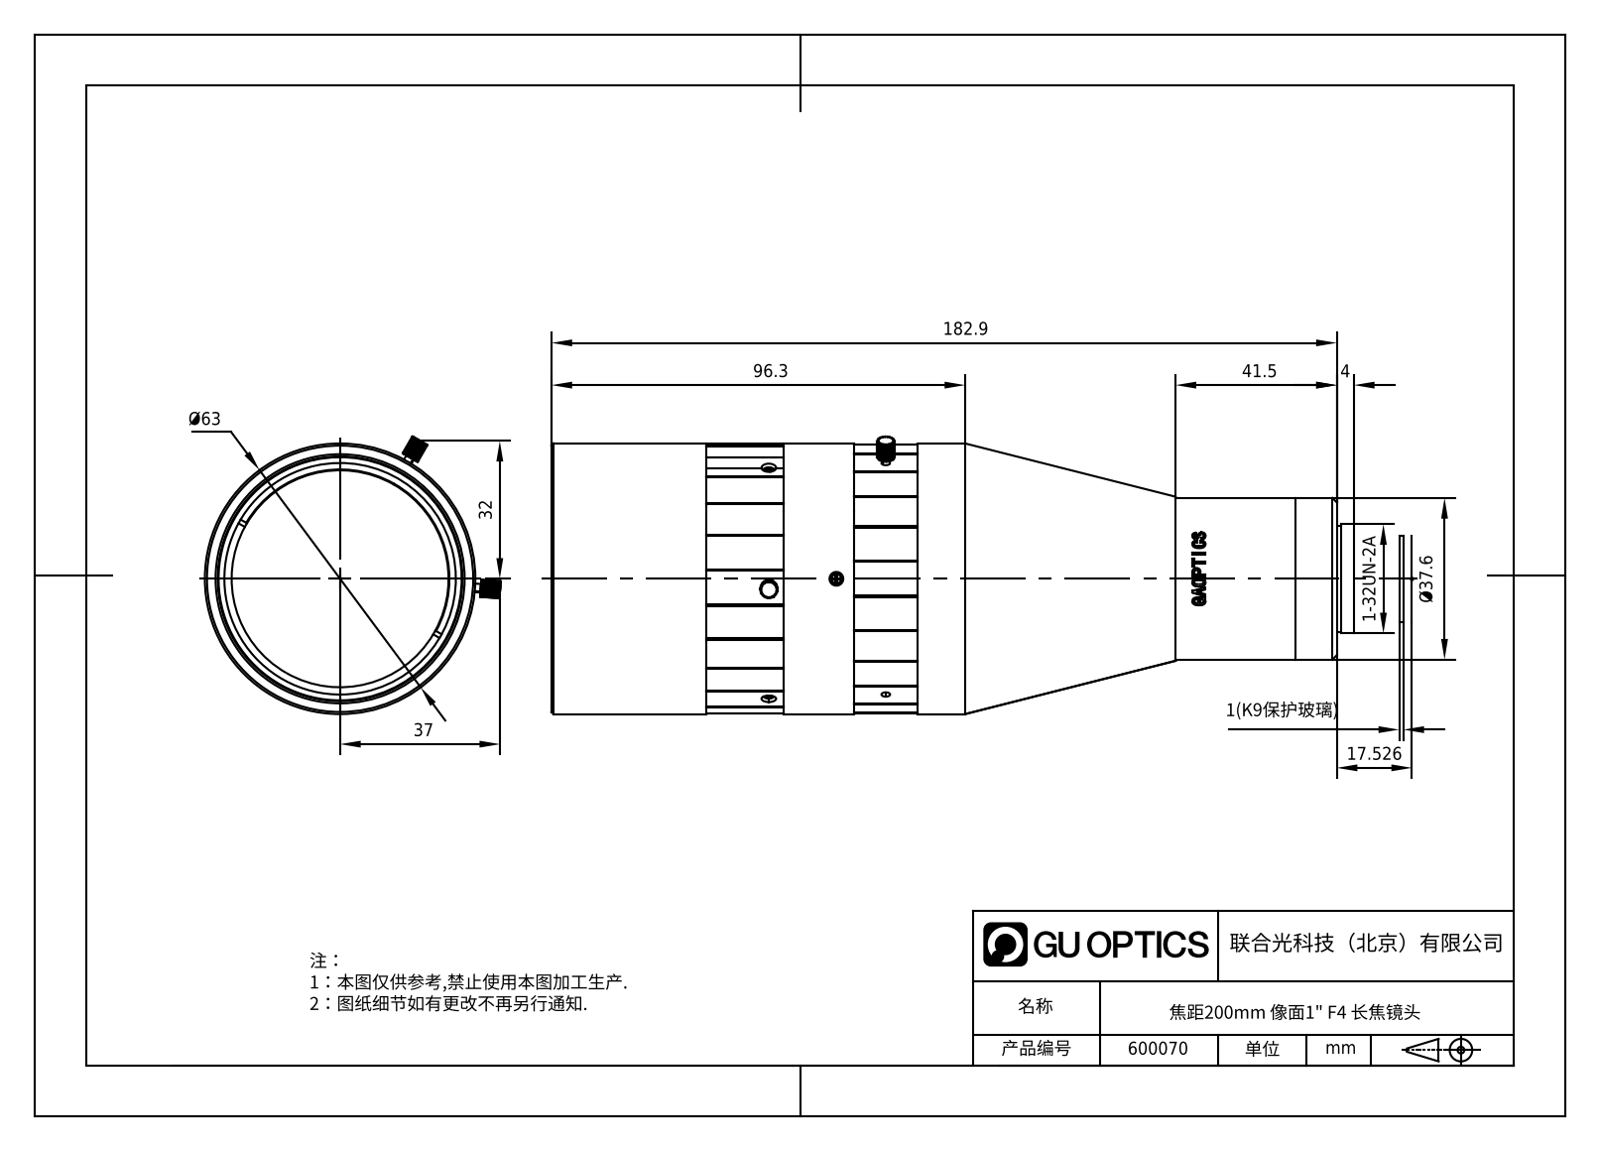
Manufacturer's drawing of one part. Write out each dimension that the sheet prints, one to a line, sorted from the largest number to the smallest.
182.9
96.3
Ø63
41.5
Ø37.6
37
32
17.526
4
1(K9保护玻璃)
1-32UN-2A
